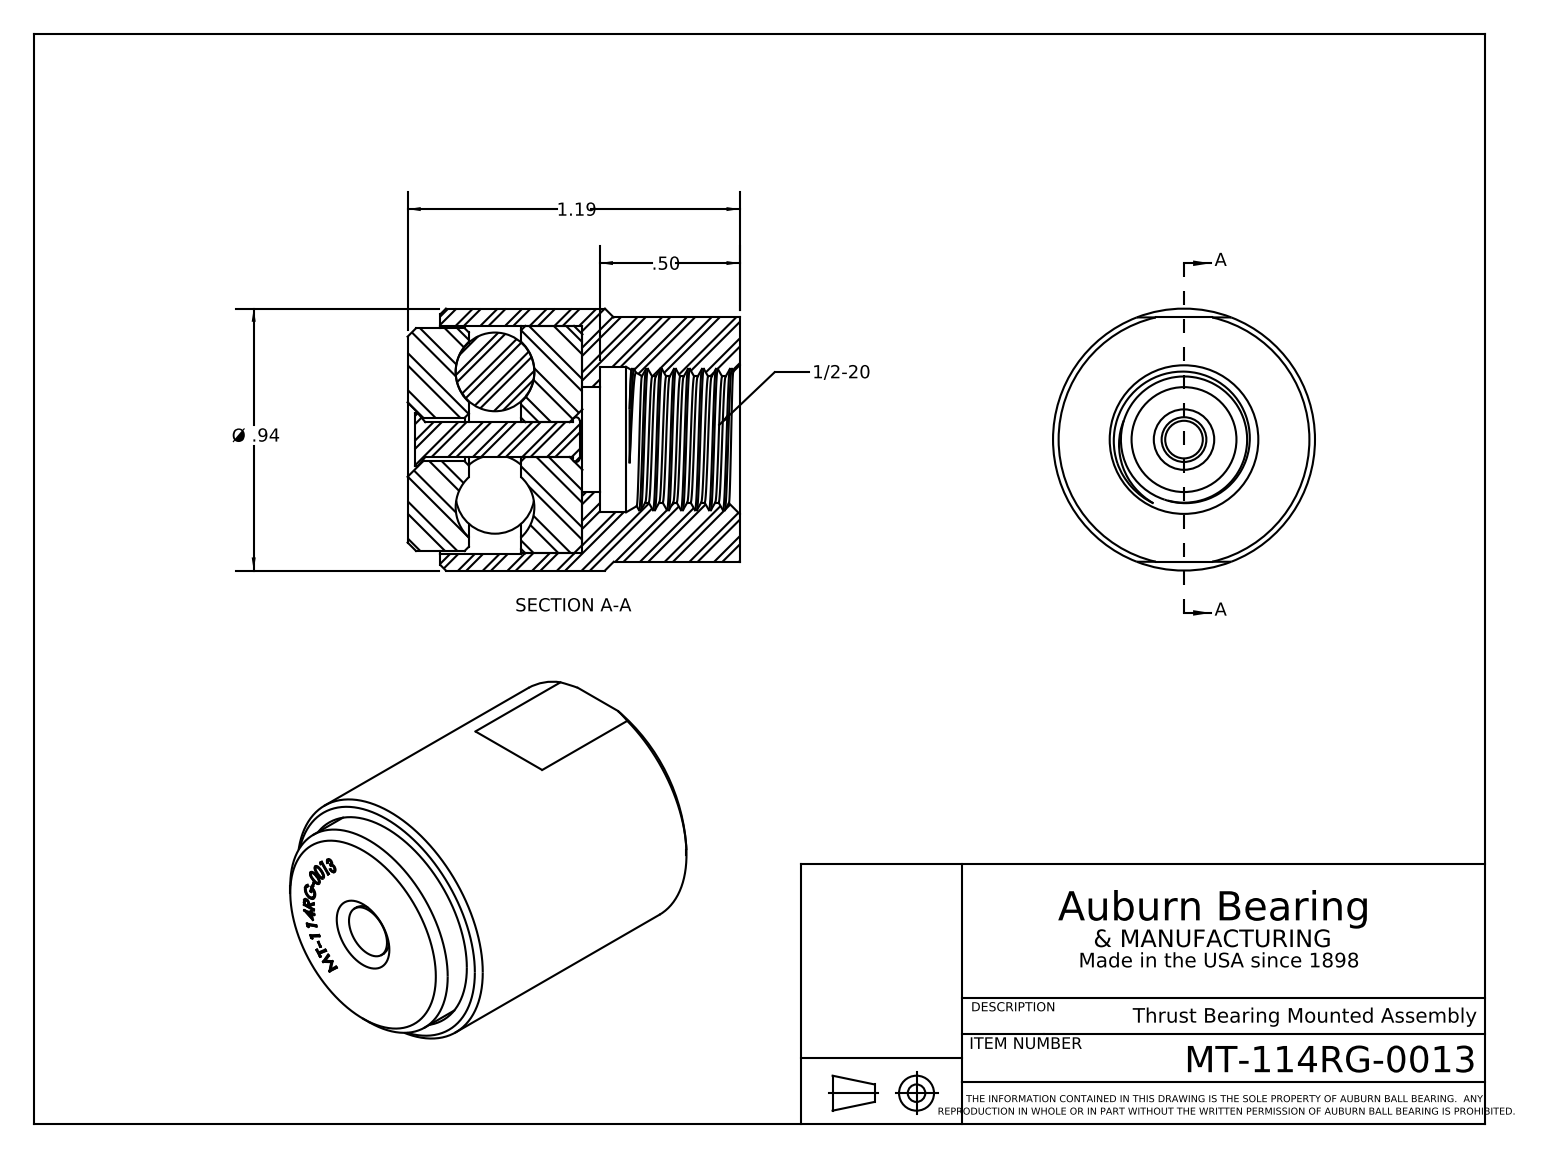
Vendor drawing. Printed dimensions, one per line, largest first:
1.19
Ø .94
.50
